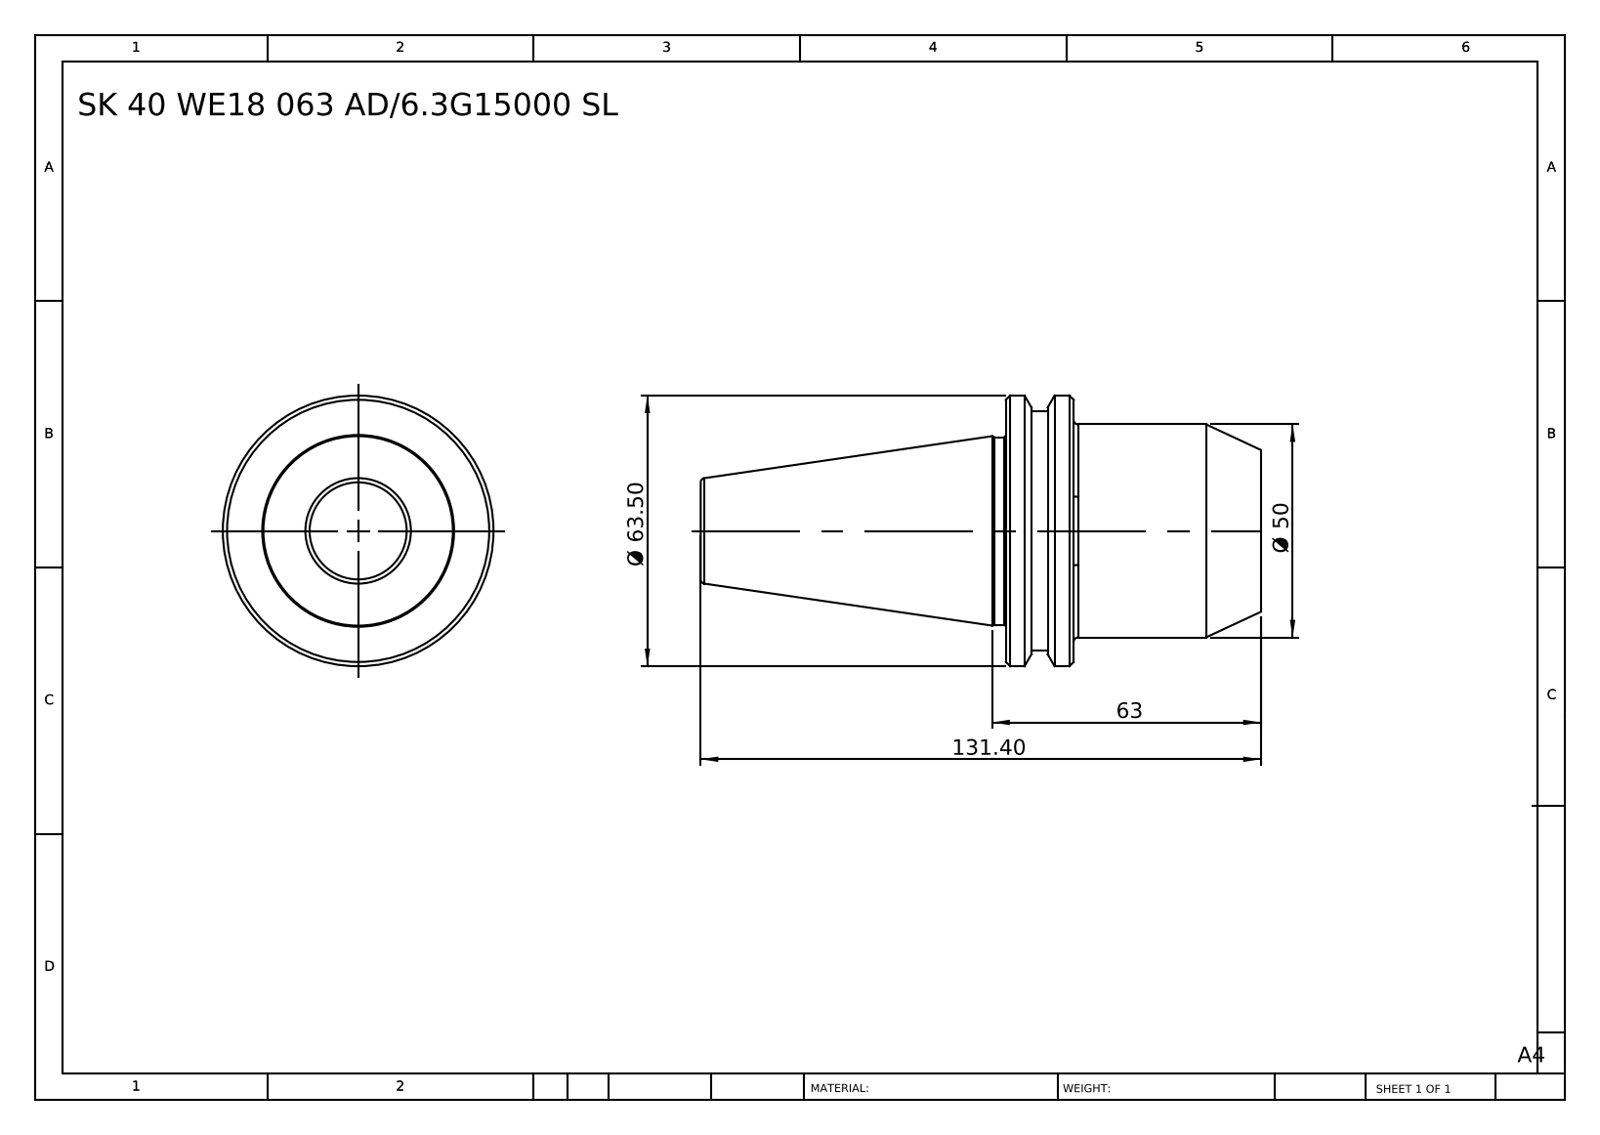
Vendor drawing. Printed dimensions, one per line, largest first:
131.40
Ø 63.50
63
Ø 50
